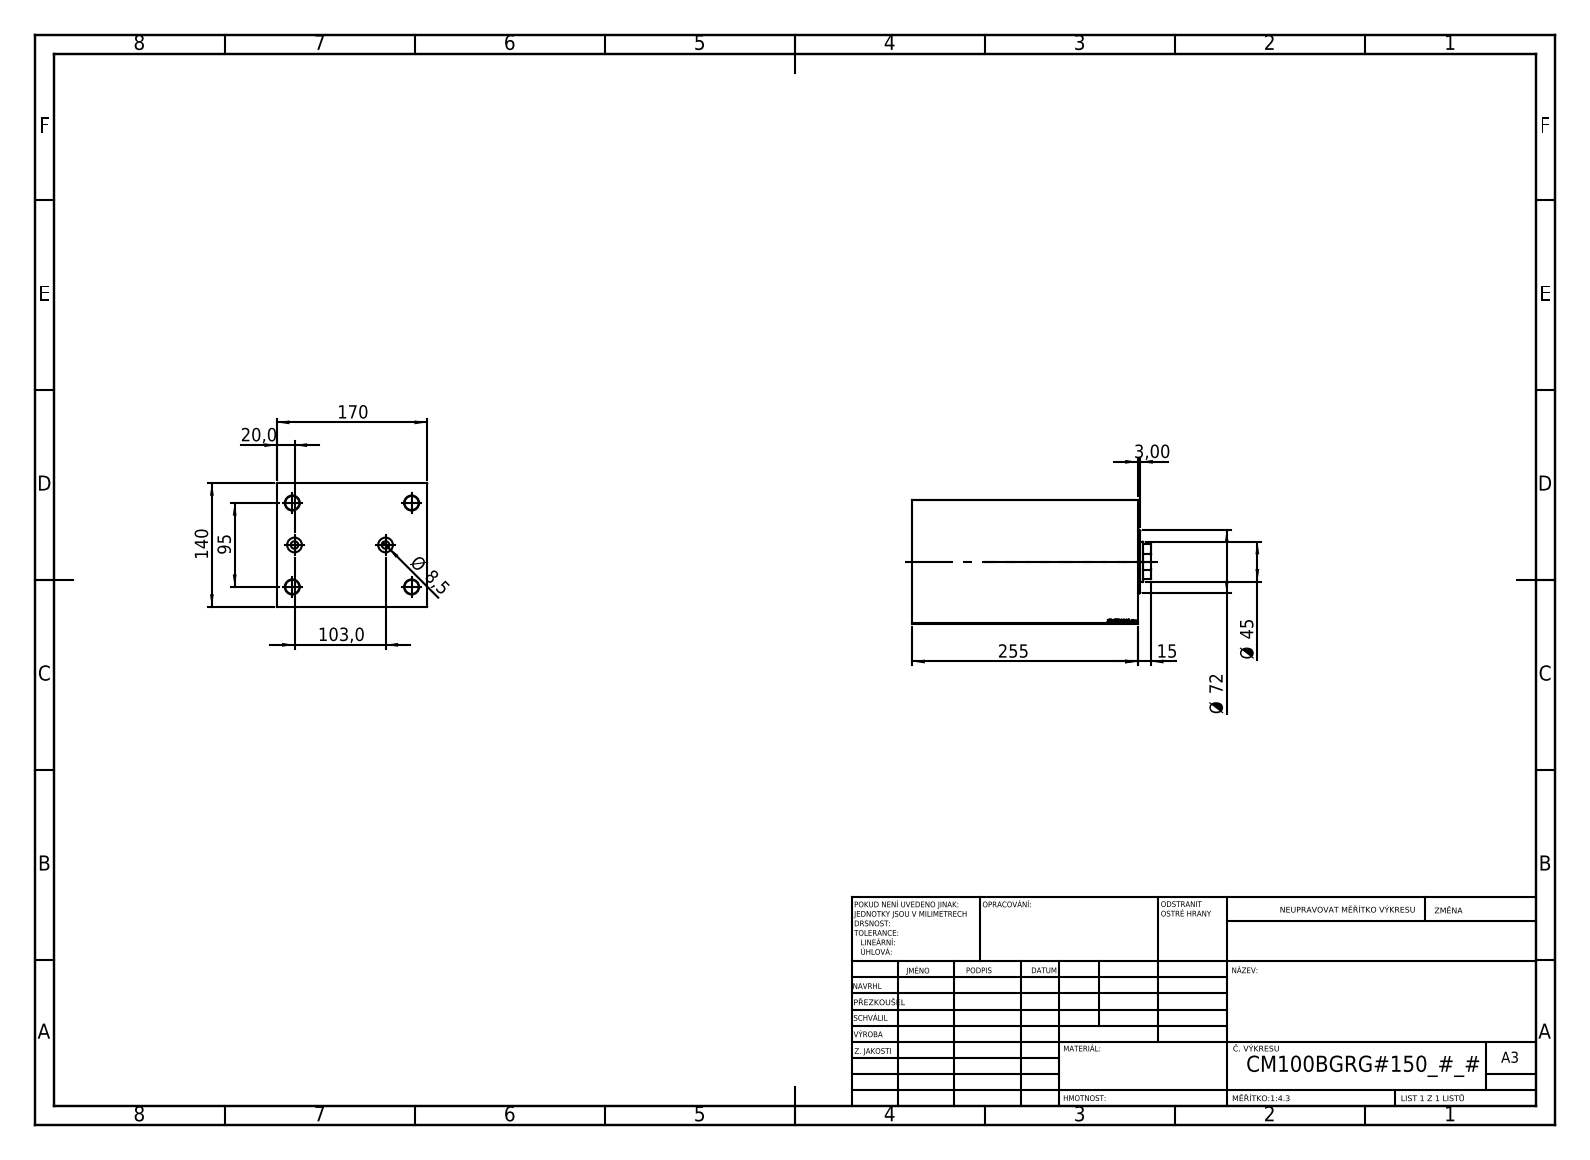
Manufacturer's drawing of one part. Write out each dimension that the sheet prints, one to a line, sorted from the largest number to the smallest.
255
170
140
103,0
95
Ø 72
Ø 45
20,0
15
Ø 8,5
3,00
